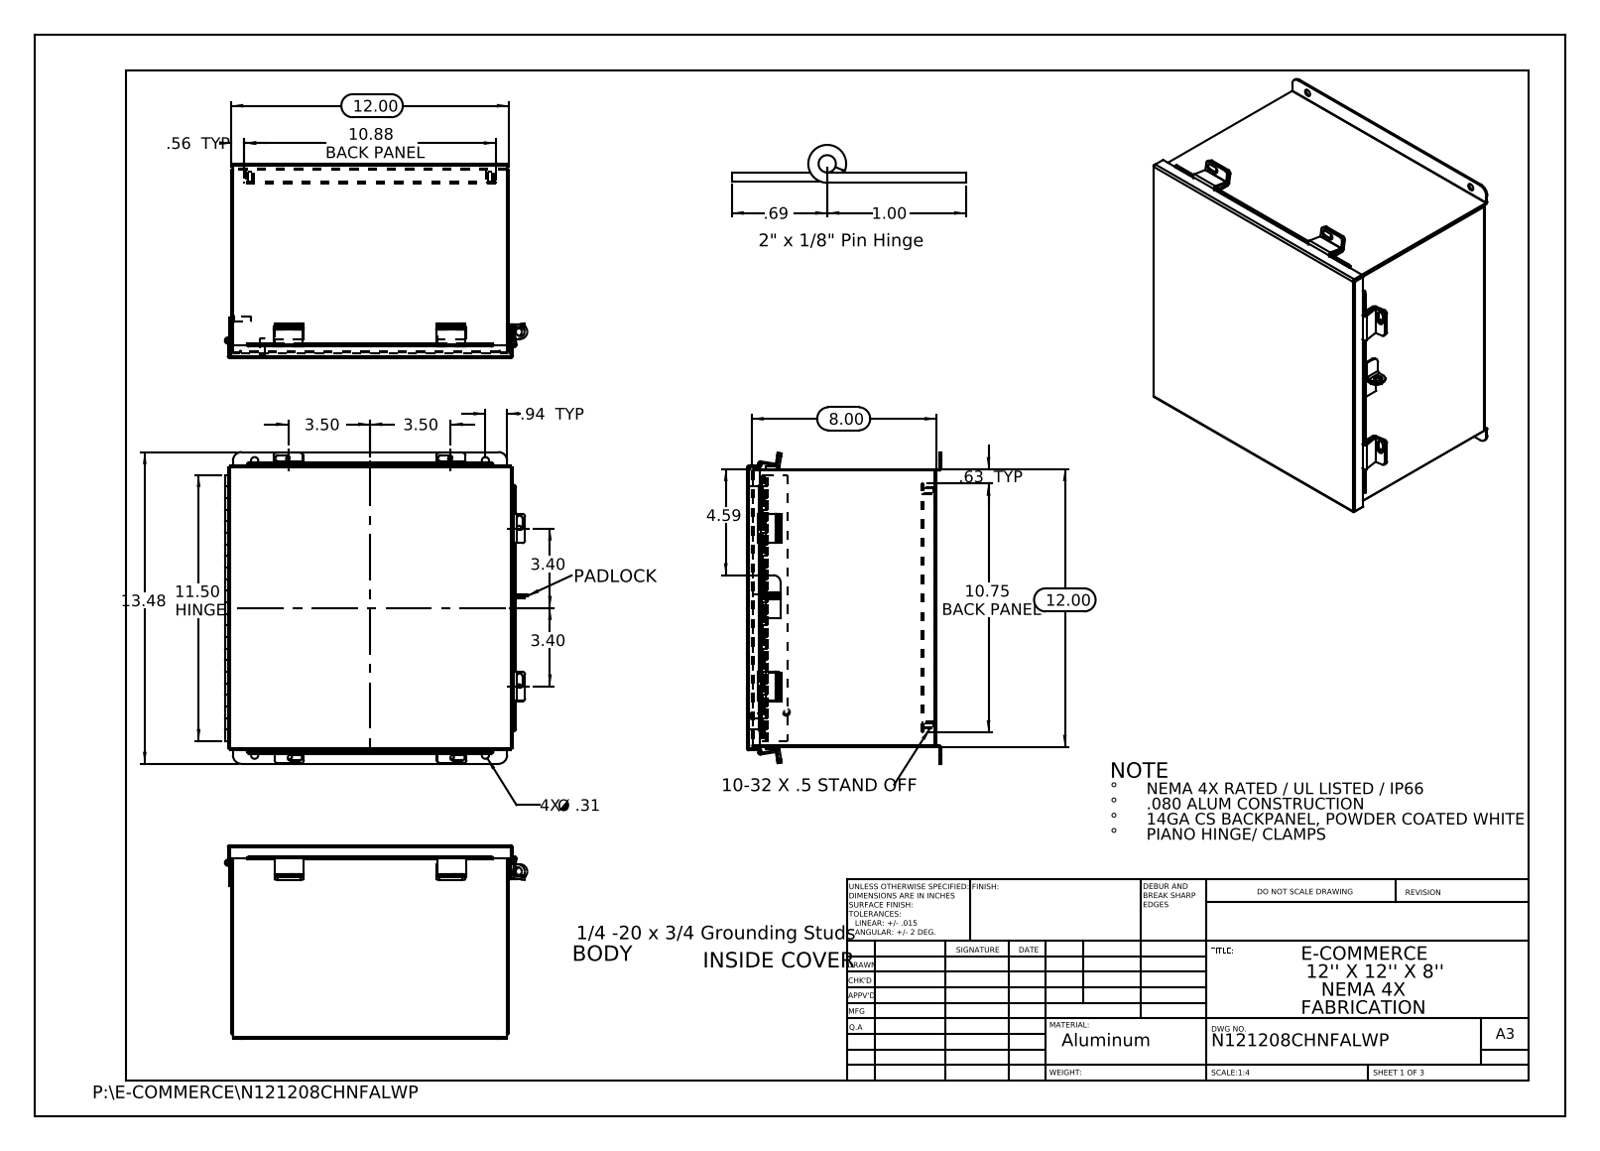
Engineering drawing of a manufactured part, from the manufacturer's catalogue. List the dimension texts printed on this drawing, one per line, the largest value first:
13.48
12.00
12.00
11.50 HINGE
10.88 BACK PANEL
10.75 BACK PANEL
8.00
4.59
3.50
3.50
3.40
3.40
1.00
.94 TYP
.69
.63 TYP
.56 TYP
4X Ø .31
